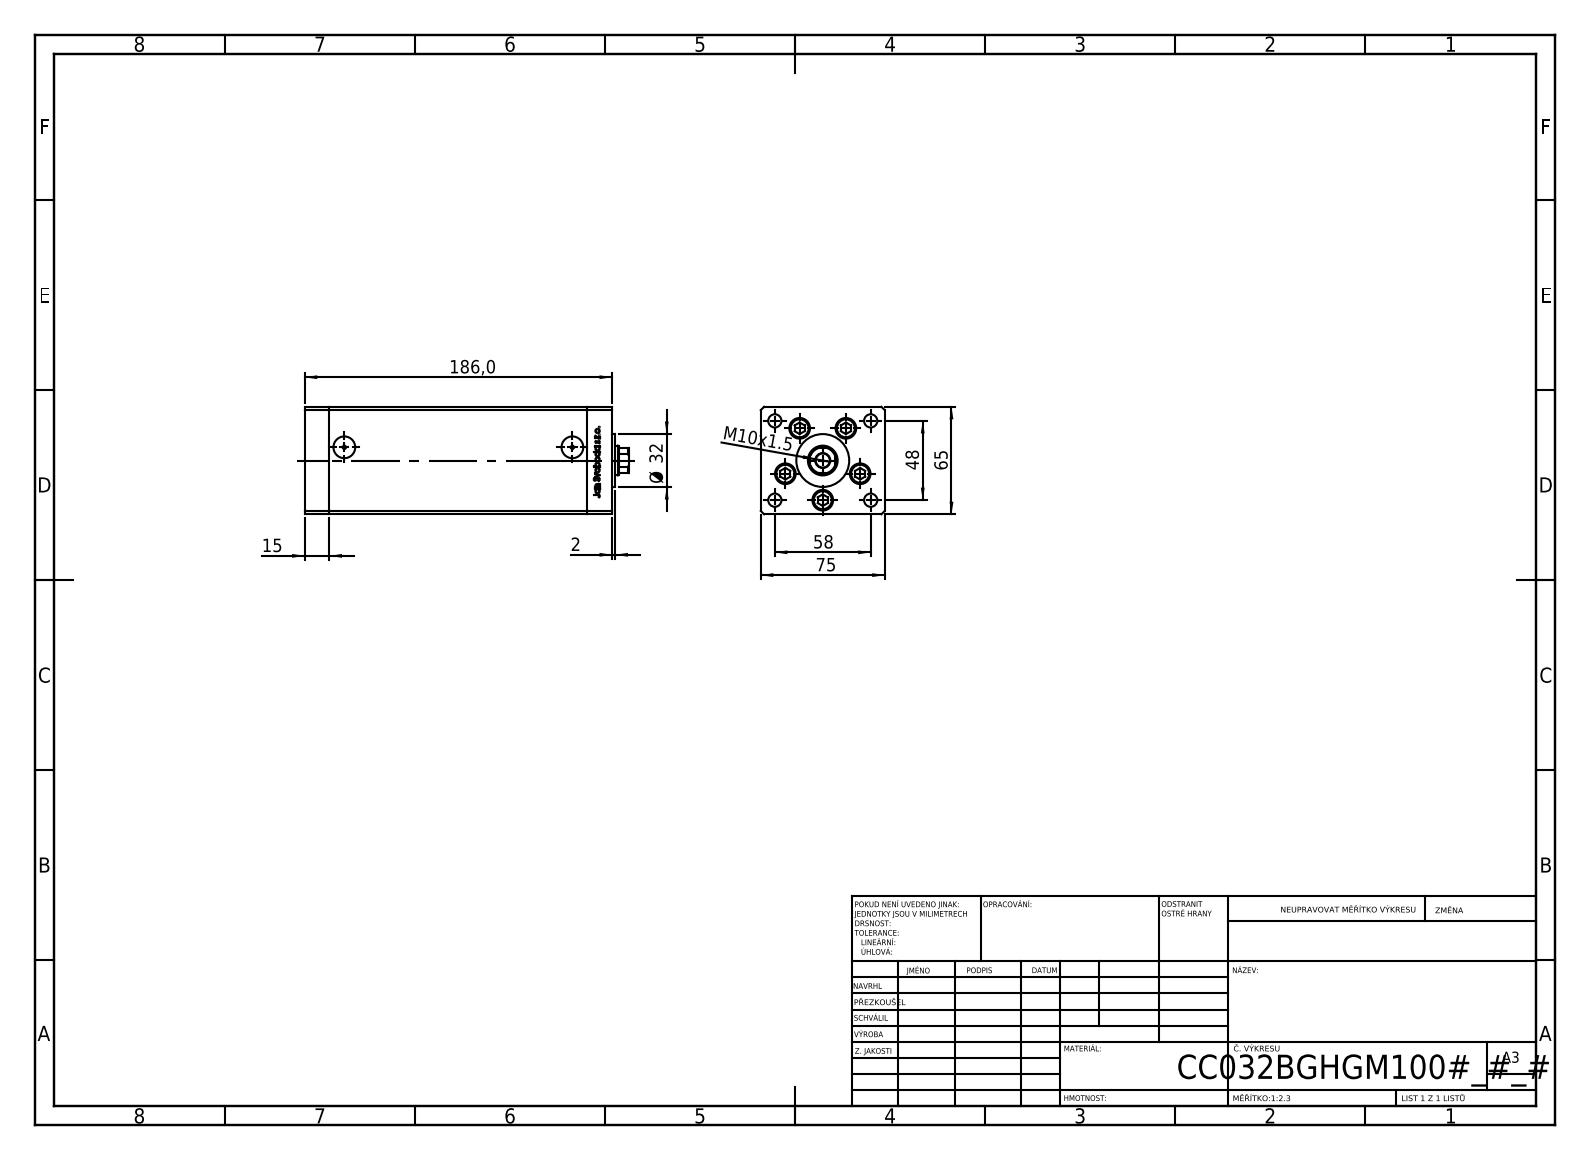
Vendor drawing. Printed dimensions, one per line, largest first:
186,0
75
65
58
48
Ø 32
15
M10x1.5
2
